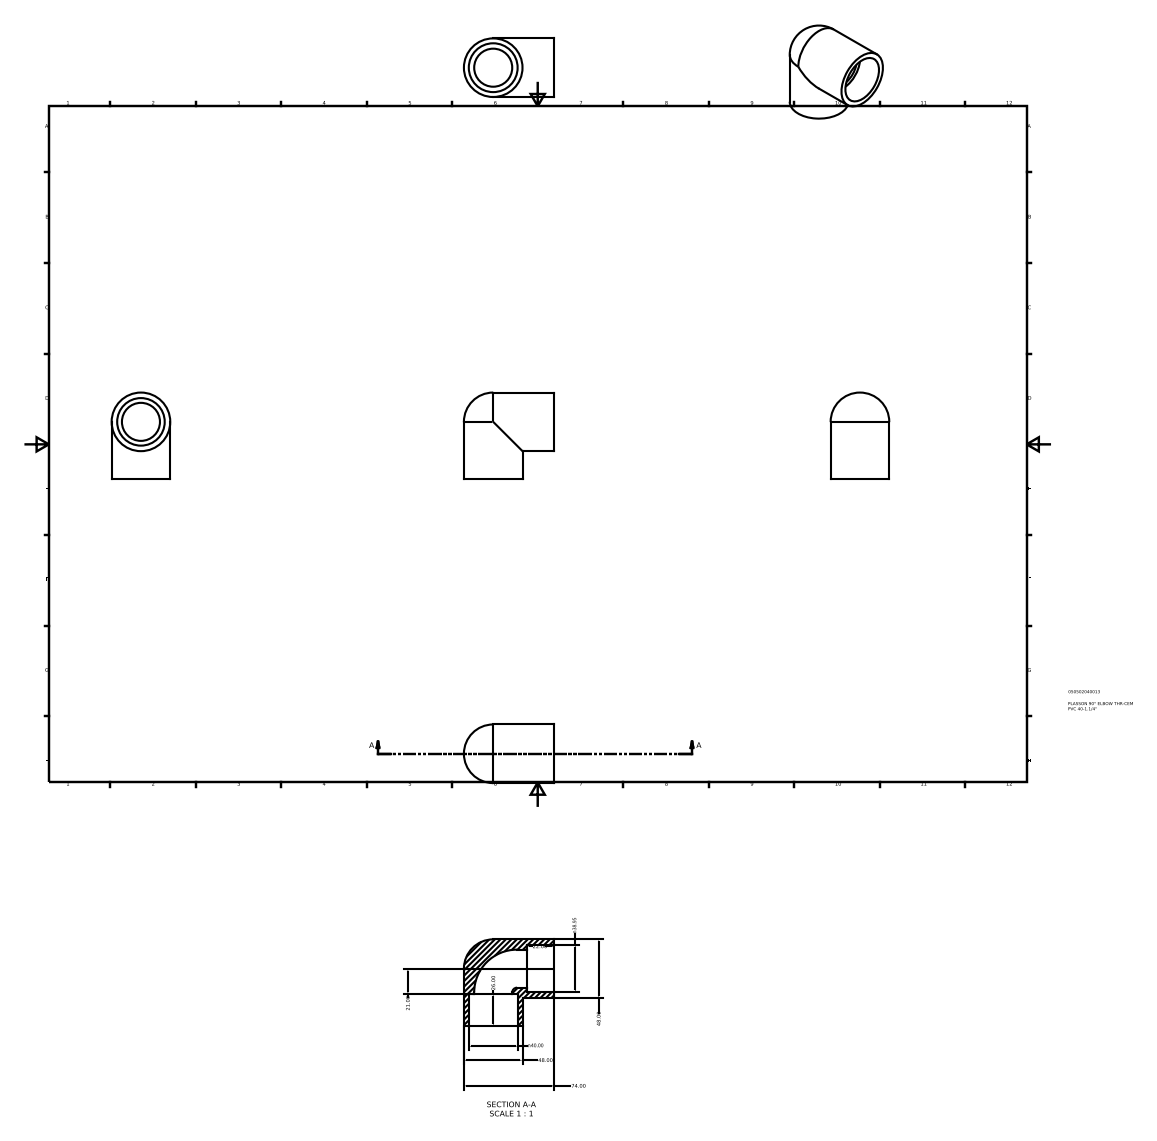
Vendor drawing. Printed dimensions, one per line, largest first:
74.00
48.00
48.00
n40.00
n38.95
26.00
22.00
21.00
